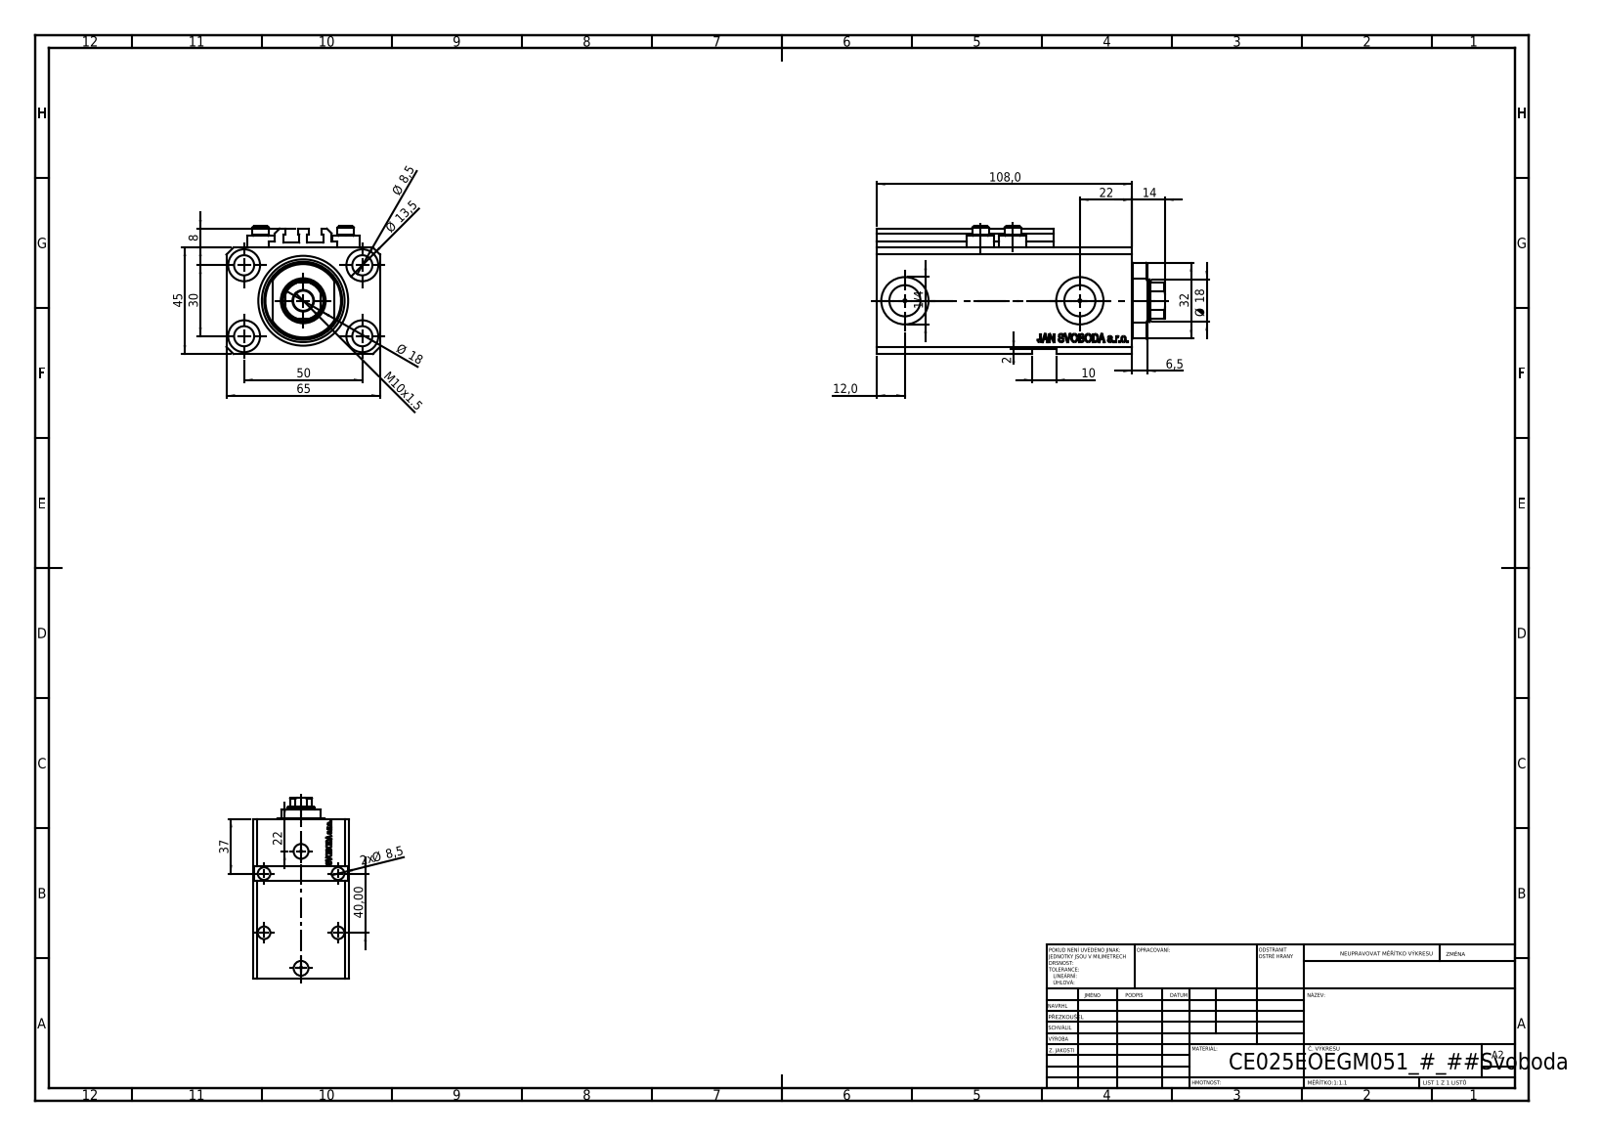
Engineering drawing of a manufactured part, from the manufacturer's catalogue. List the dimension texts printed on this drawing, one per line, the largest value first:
108,0
65
50
45
40,00
37
32
30
22
22
Ø 18
Ø 18
14
Ø 13,5
12,0
M10x1.5
10
Ø 8,5
2x Ø 8,5
8
6,5
2
1/4
